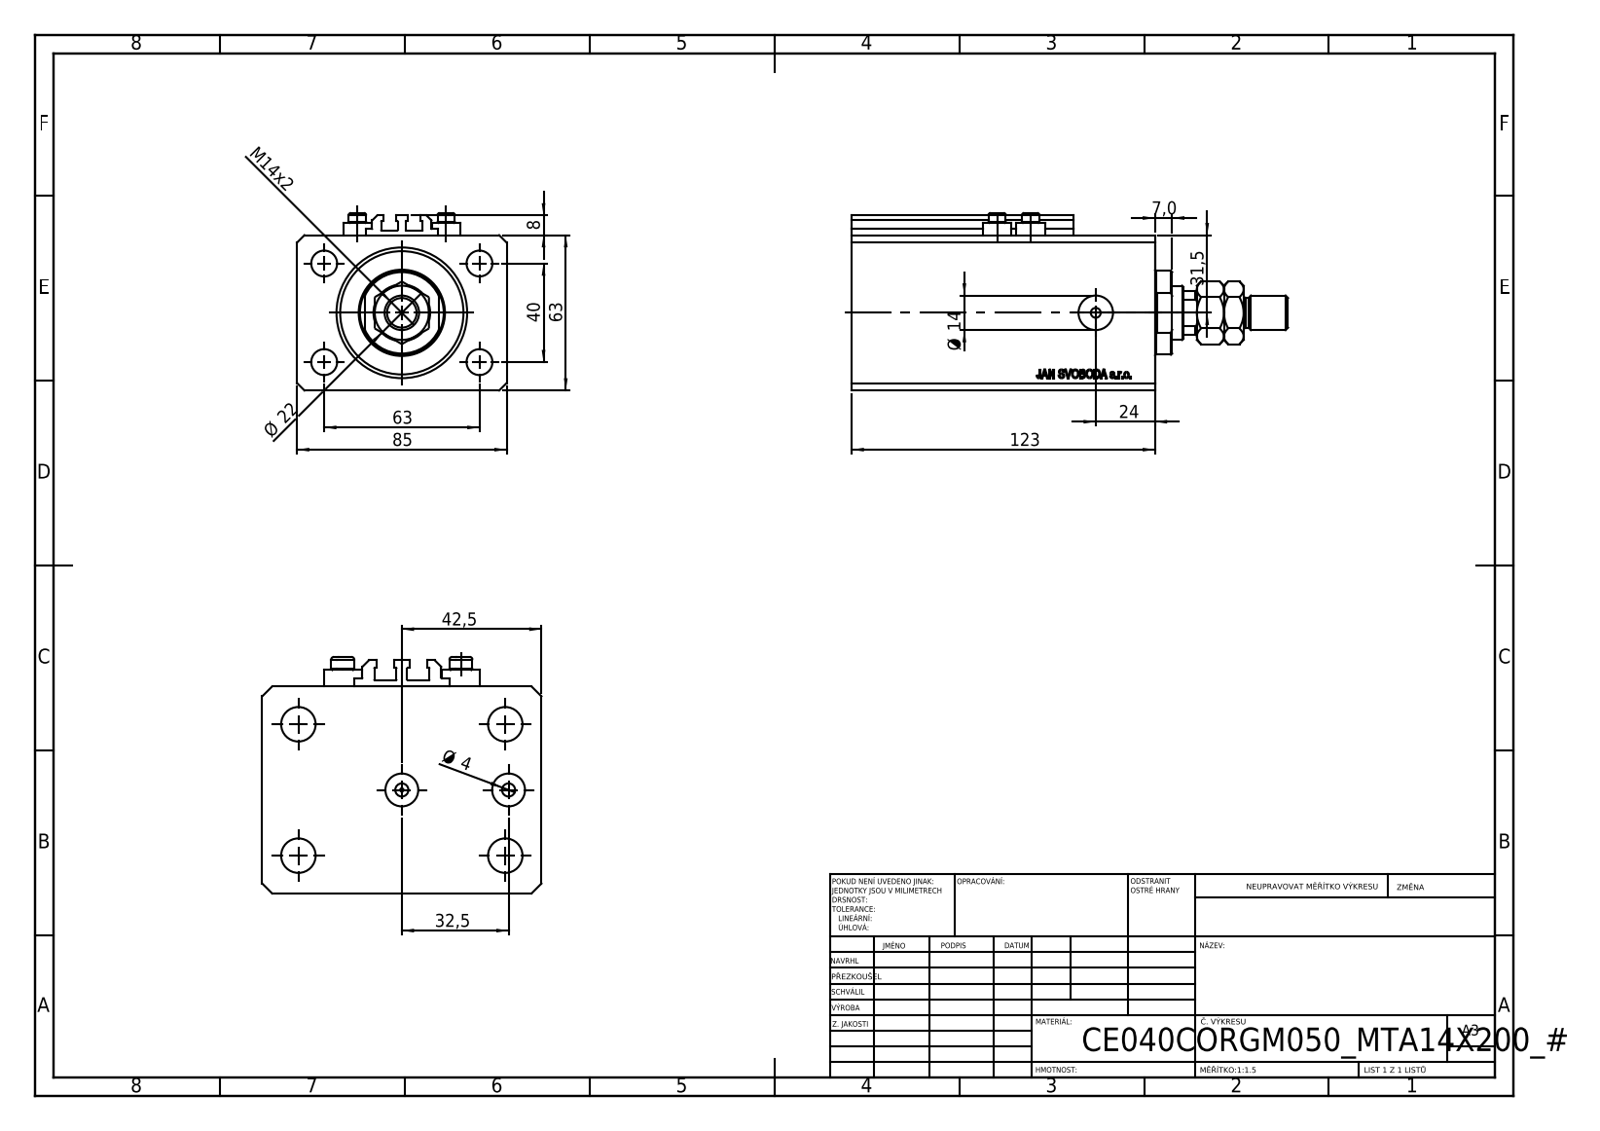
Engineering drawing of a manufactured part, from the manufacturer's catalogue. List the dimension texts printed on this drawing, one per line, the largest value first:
123
85
63
63
42,5
40
32,5
31,5
24
Ø 22
M14x2
Ø 14
8
7,0
Ø 4
